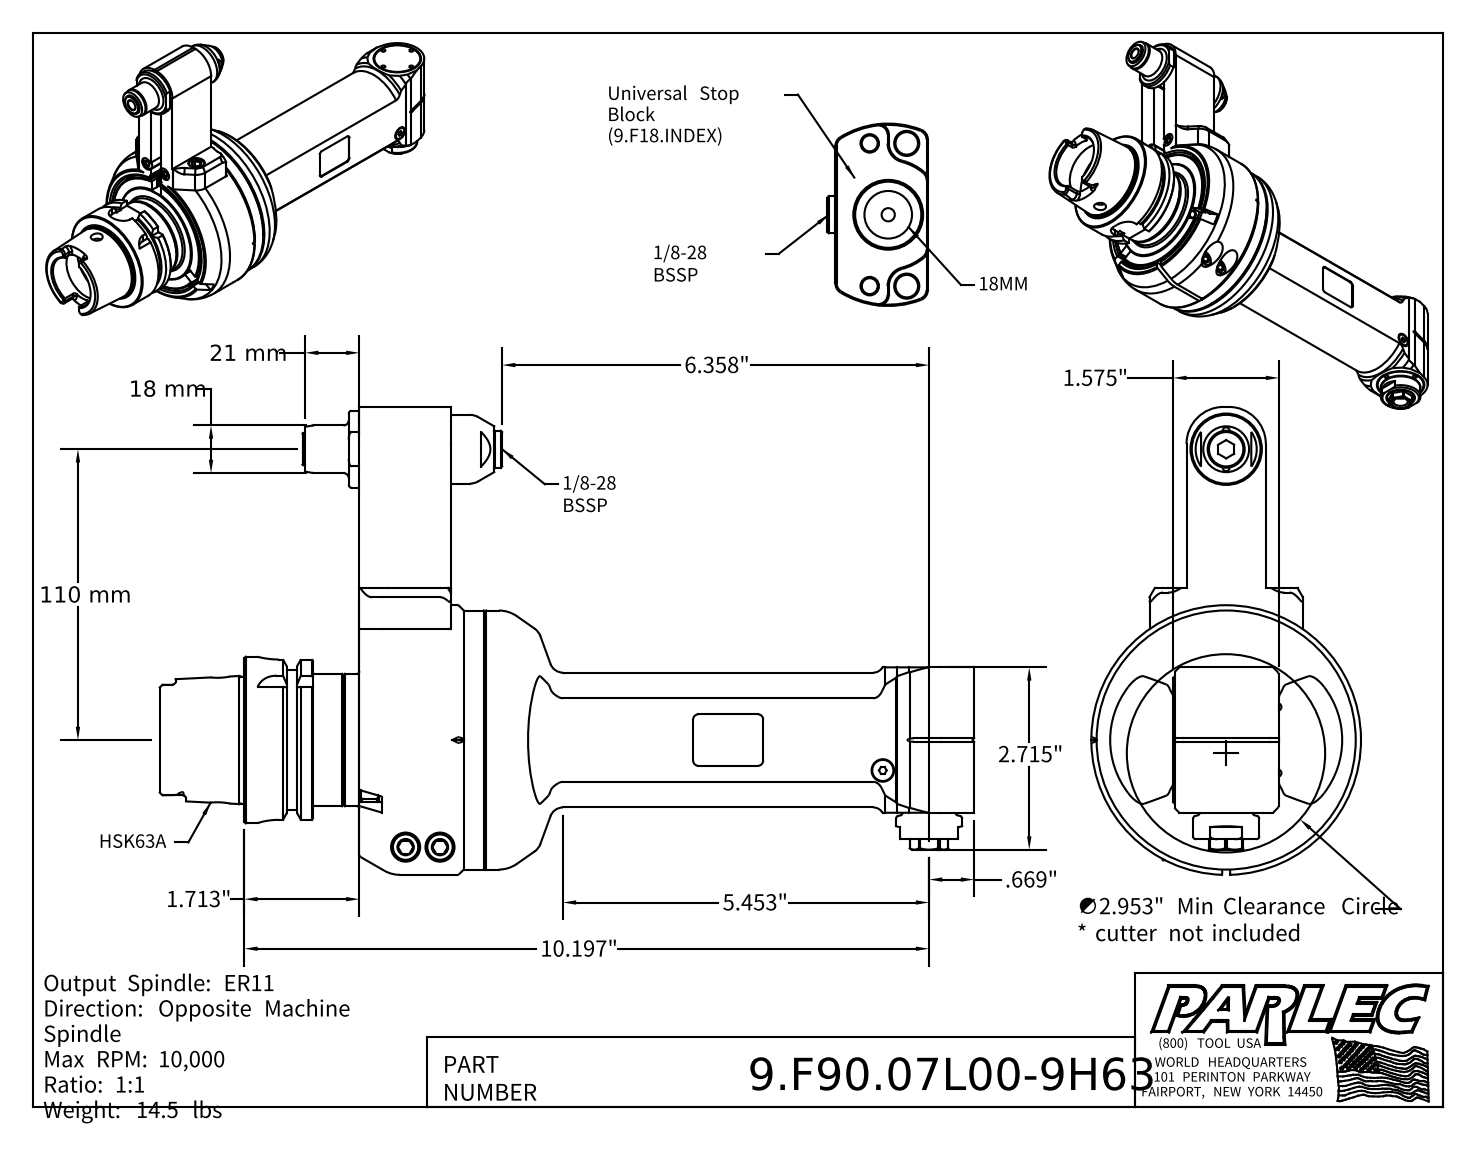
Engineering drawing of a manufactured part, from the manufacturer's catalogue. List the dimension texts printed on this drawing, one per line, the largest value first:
110 mm
21 mm
18 mm
10.197"
6.358"
5.453"
∅2.953" Min Clearance Circle * cutter not included
2.715"
1.713"
1.575"
.669"
